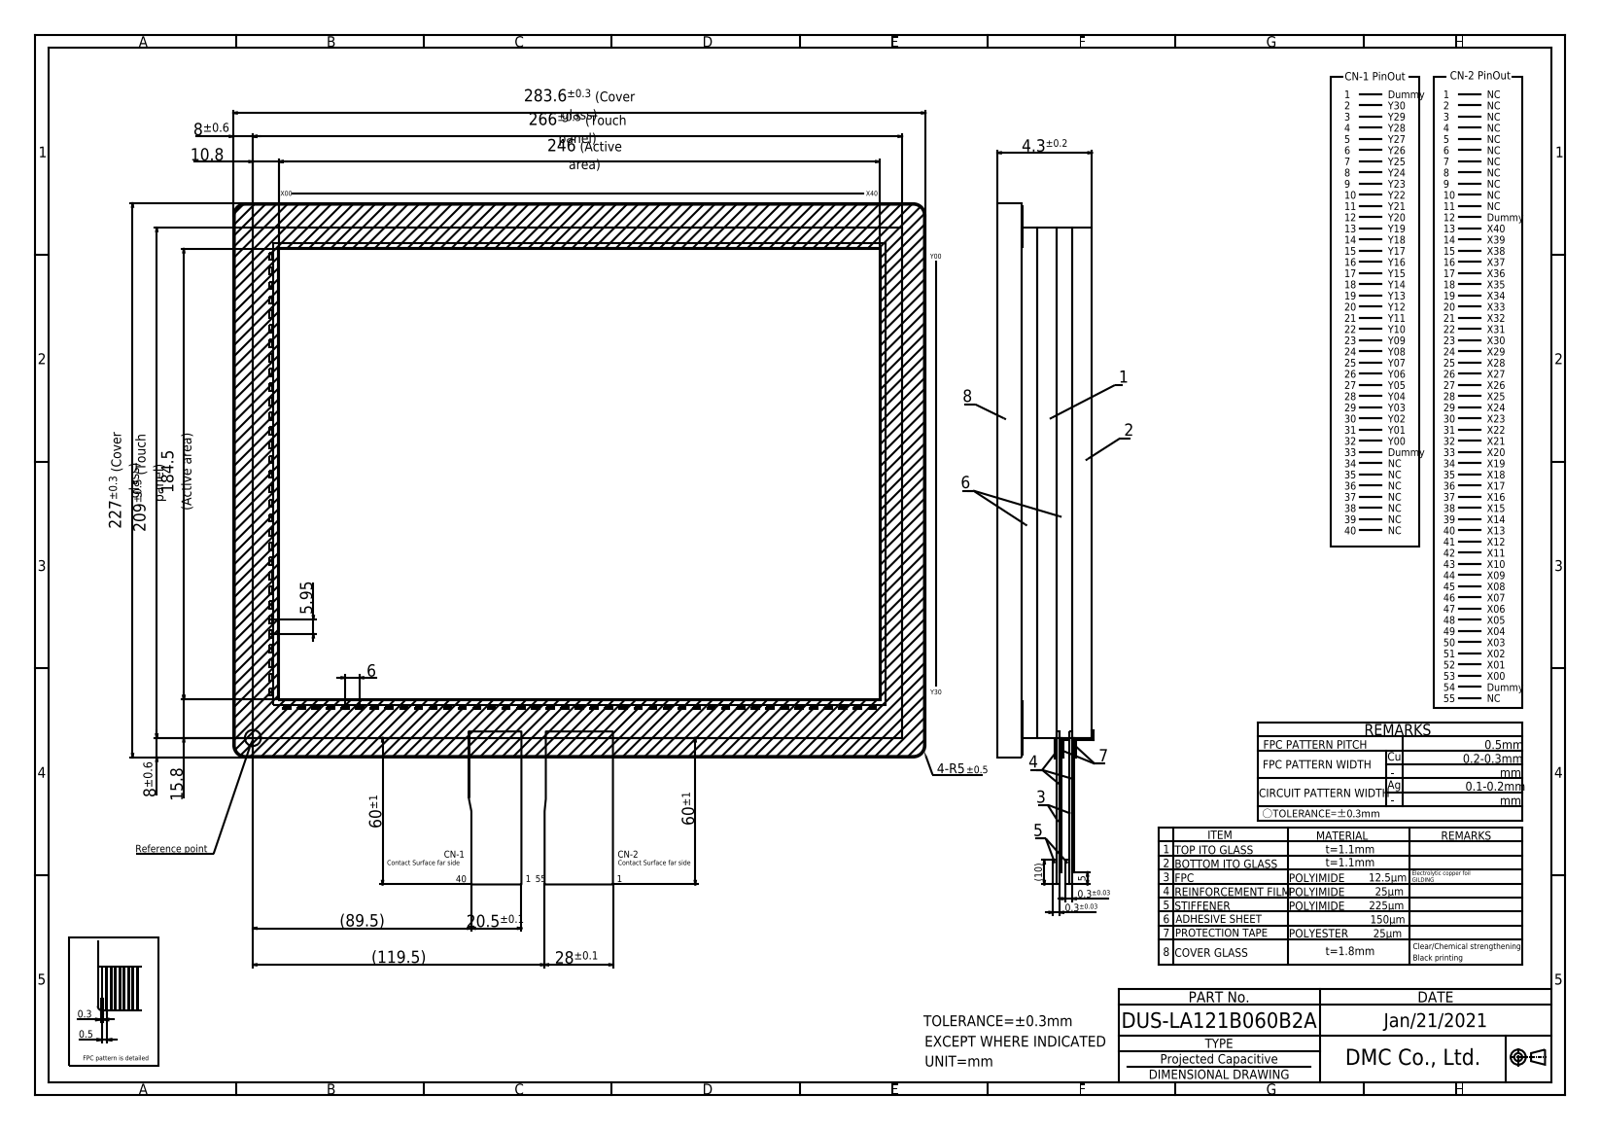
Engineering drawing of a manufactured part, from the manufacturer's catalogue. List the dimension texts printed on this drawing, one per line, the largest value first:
283.6±0.3 (Cover glass)
266±0.5 (Touch panel)
246 (Active area)
227±0.3 (Cover glass)
209±0.5 (Touch panel)
184.5 (Active area)
(119.5)
(89.5)
60±1
60±1
28±0.1
20.5±0.1
15.8
10.8
(10)
8±0.6
8±0.6
6
5.95
5
4.3±0.2
0.5
0.3±0.03
0.3±0.03
0.3
